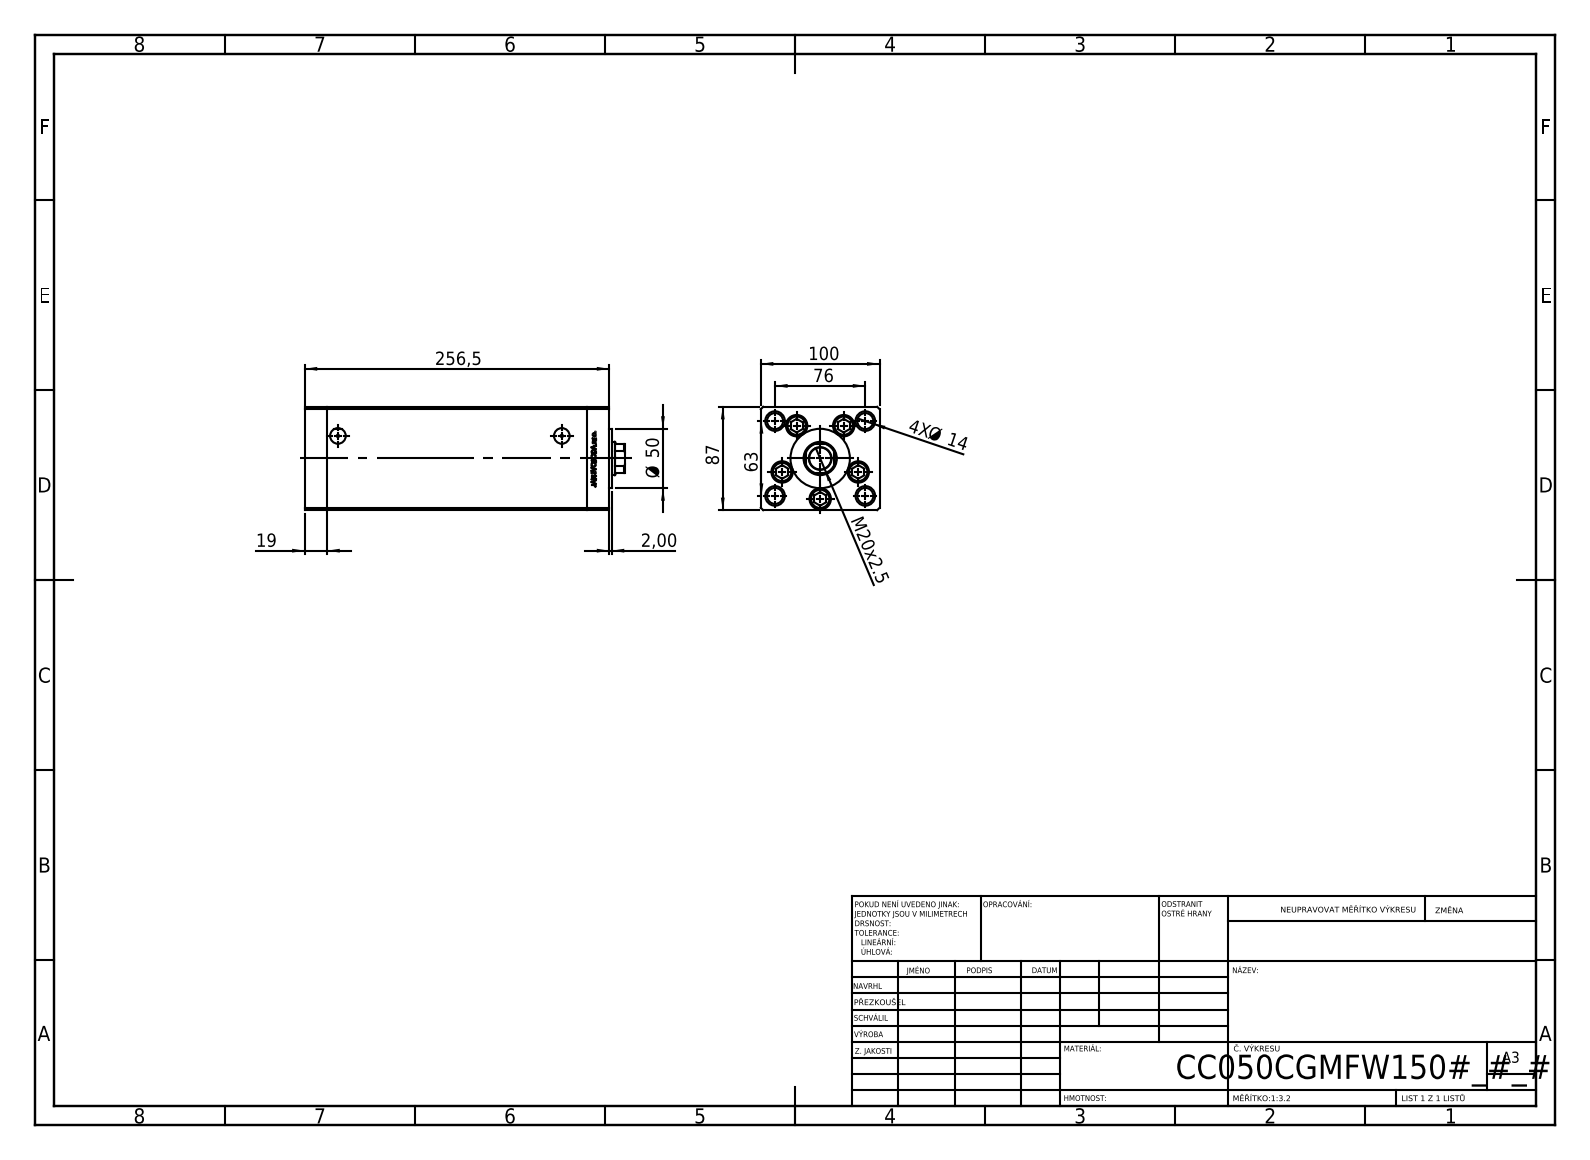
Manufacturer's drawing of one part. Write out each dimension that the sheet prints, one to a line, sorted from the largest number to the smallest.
256,5
100
87
76
63
Ø 50
M20x2.5
19
4X Ø 14
2,00
